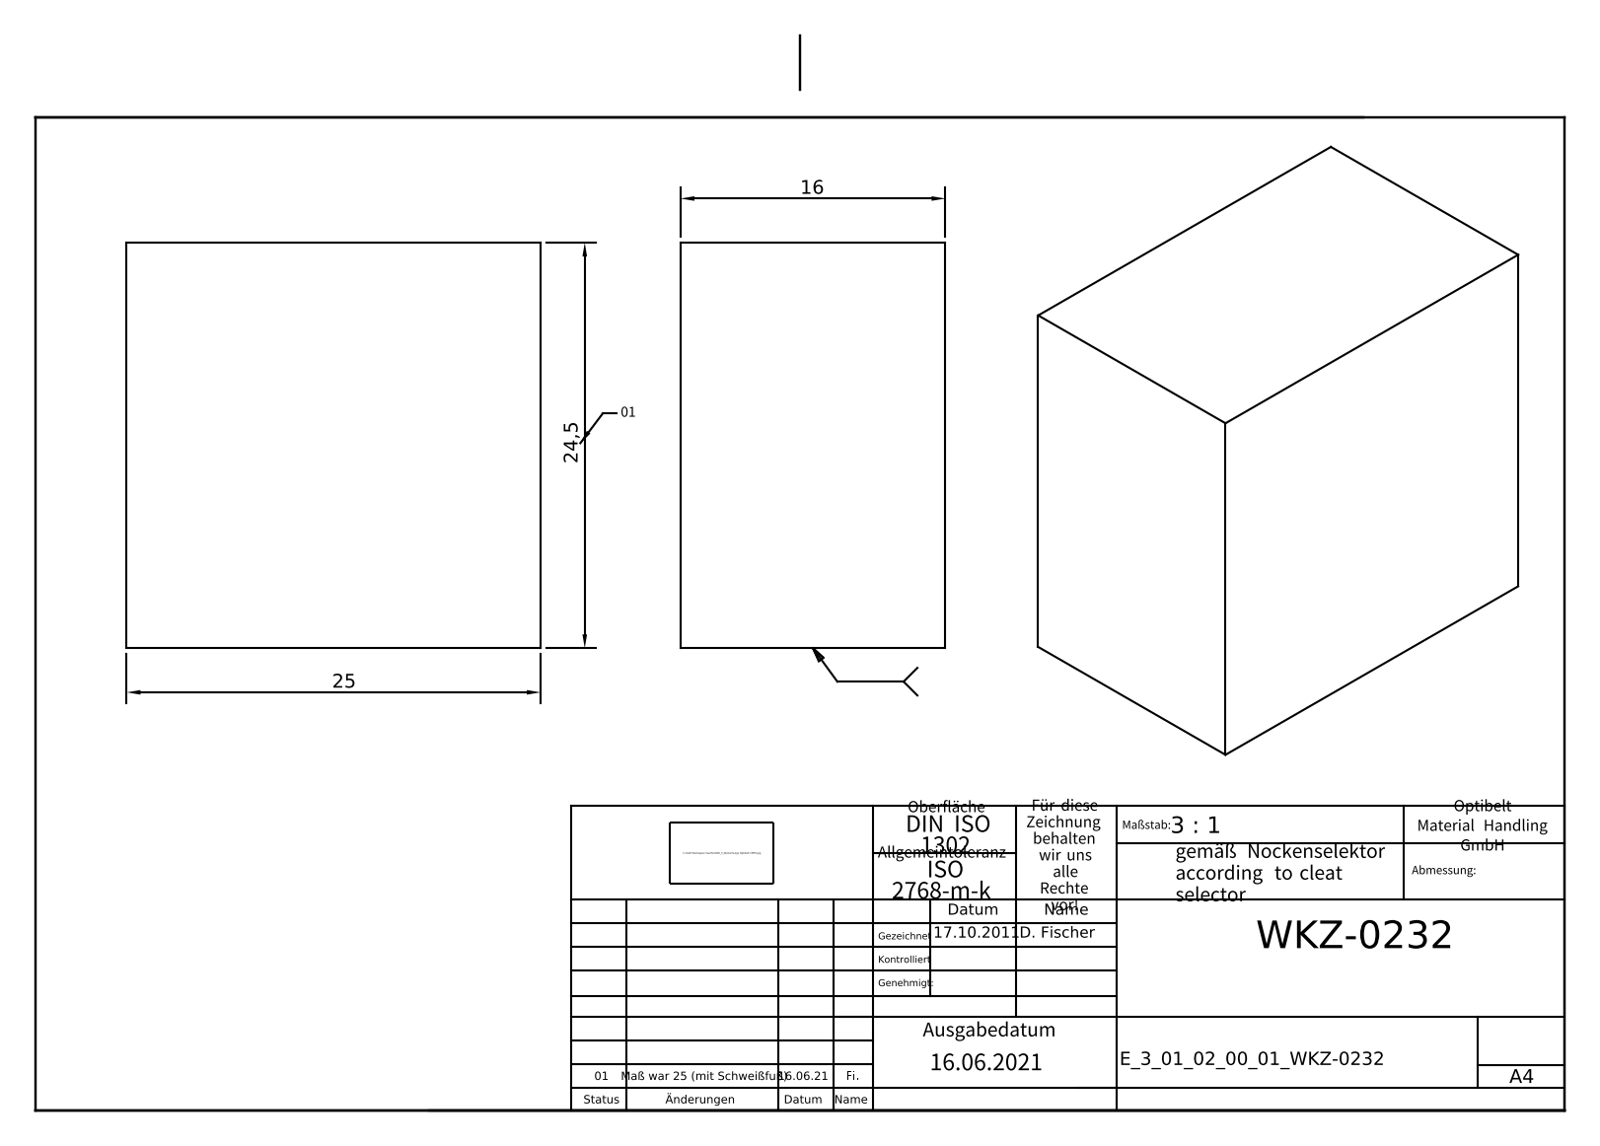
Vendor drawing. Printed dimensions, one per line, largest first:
25
24,5
16
